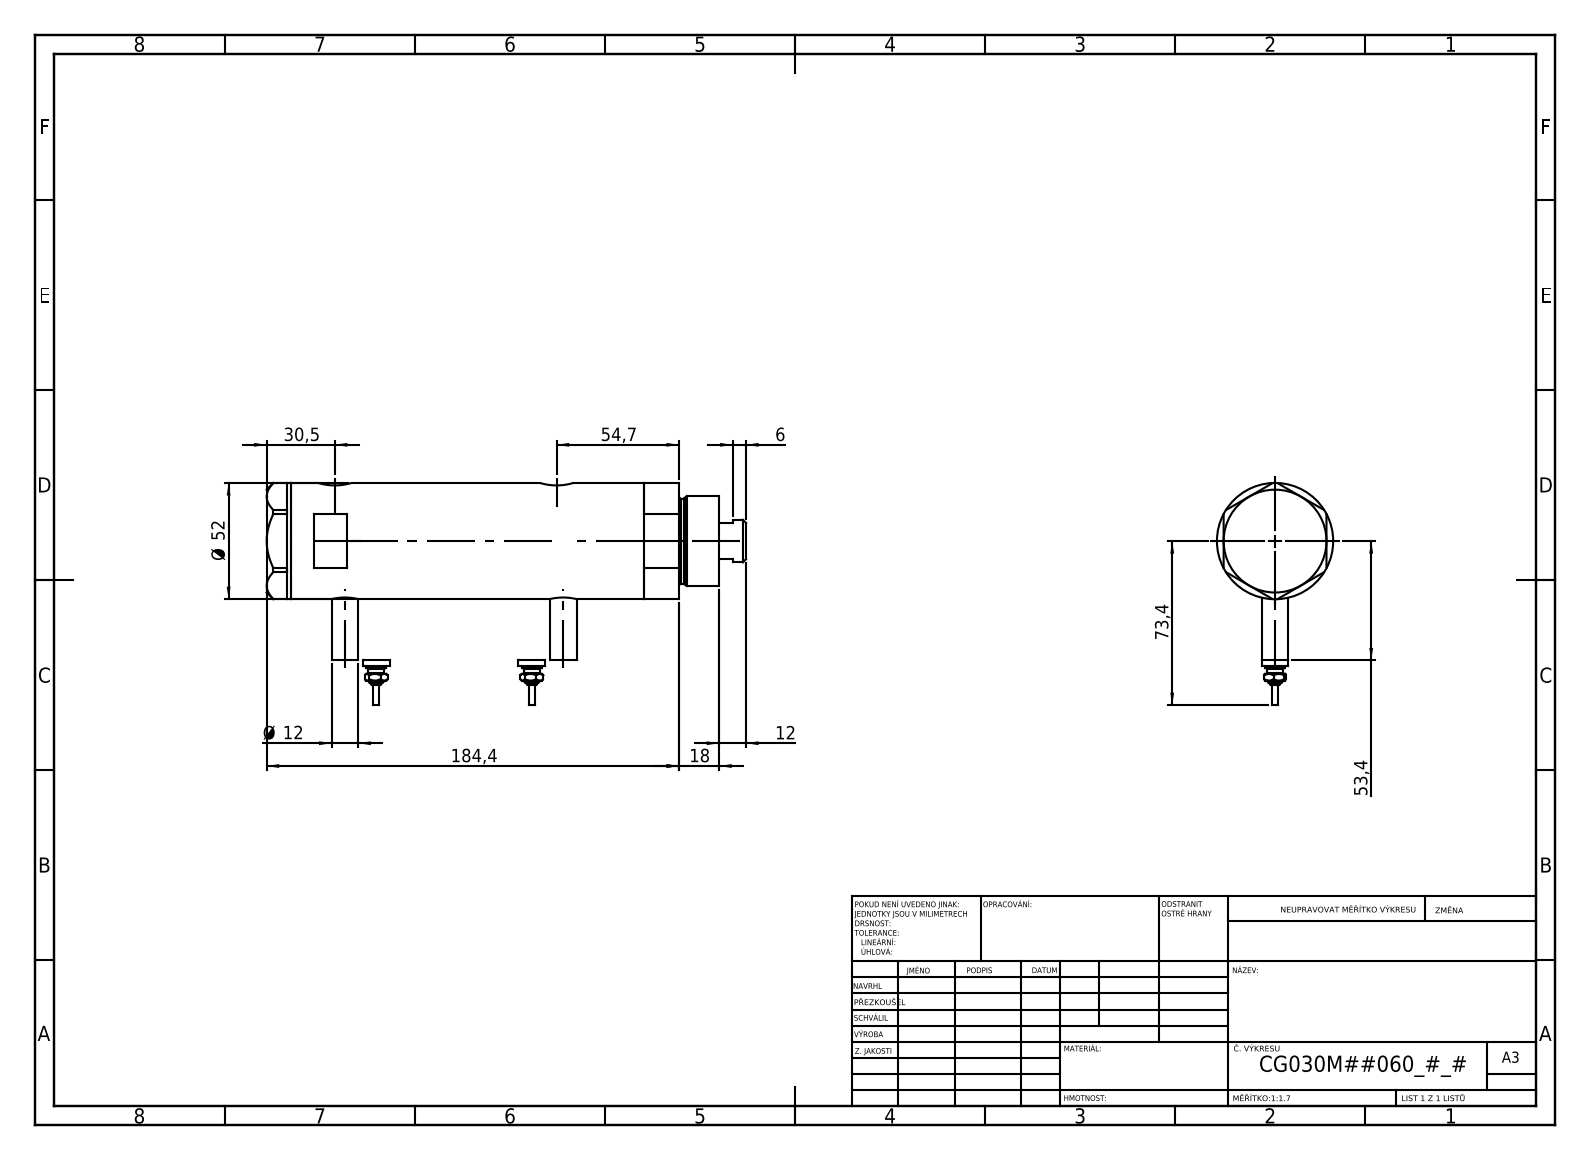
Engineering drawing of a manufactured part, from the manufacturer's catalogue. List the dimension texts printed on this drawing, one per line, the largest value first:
184,4
73,4
54,7
53,4
Ø 52
30,5
18
12
Ø 12
6
